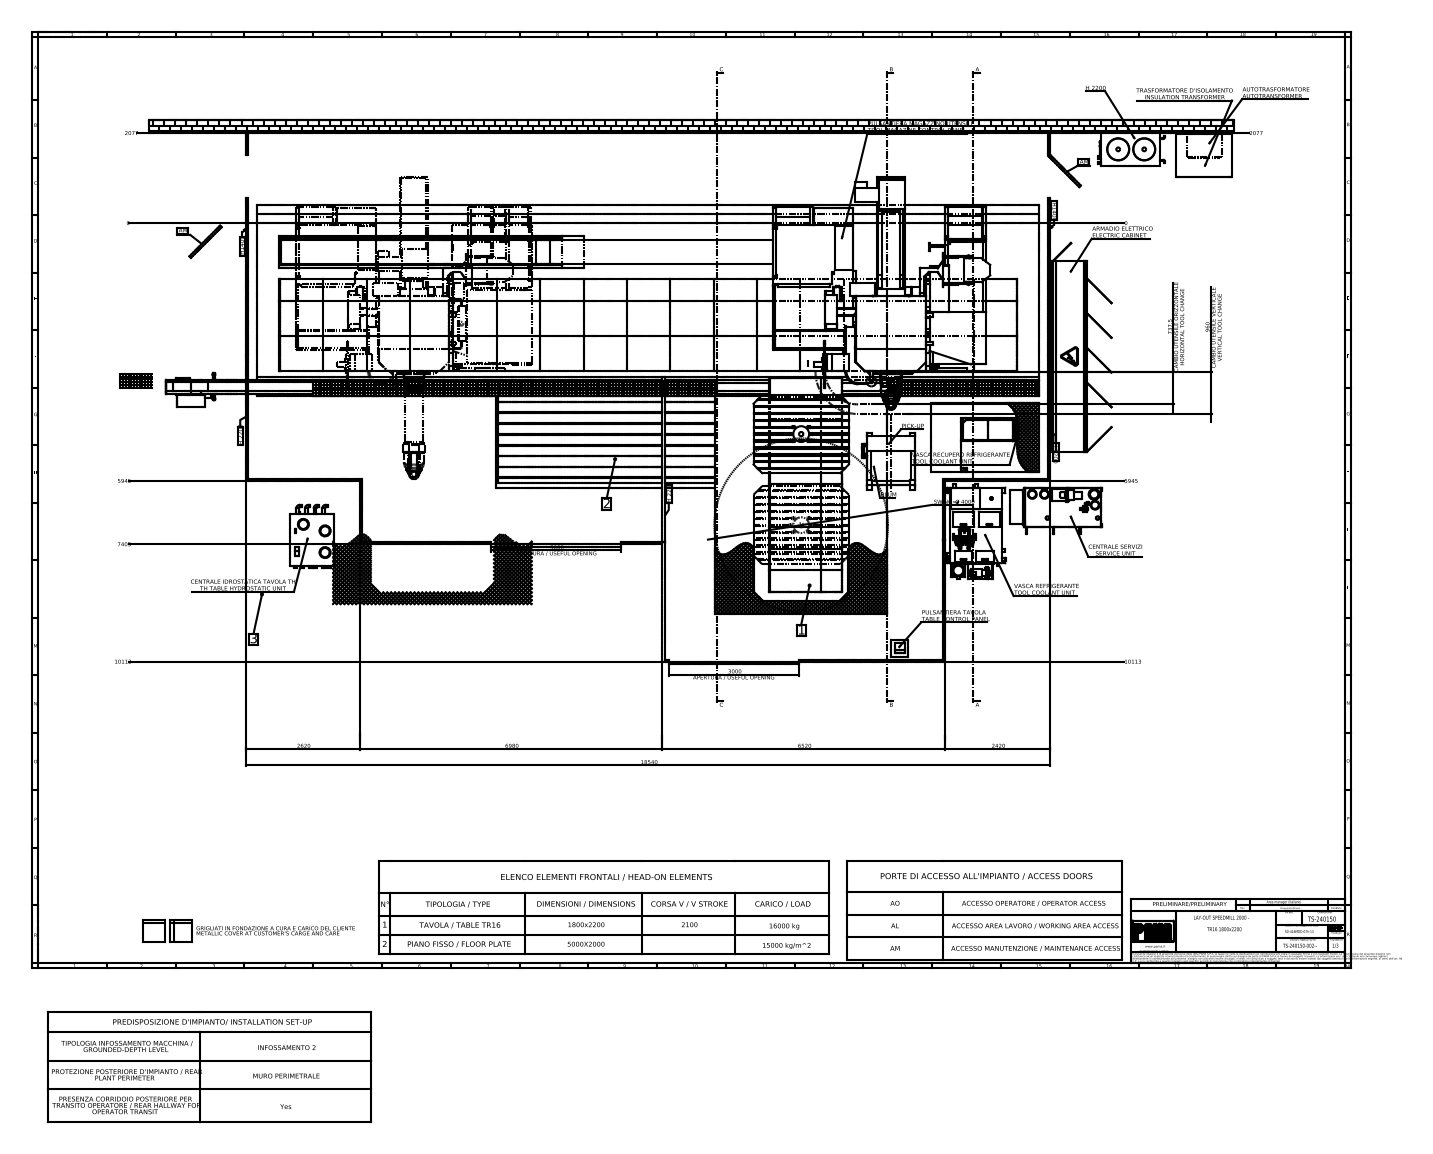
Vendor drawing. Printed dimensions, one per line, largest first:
18540
10113
10113
7405
6980
6520
5945
5945
SWING= Ø 4000
3000 APERTURA / USEFUL OPENING
3000 APERTURA / USEFUL OPENING
2620
2420
2077
2077
960 CAMBIO UTENSILE VERTICALE VERTICAL TOOL CHANGE
737,5 CAMBIO UTENSILE ORIZZONTALE HORIZONTAL TOOL CHANGE
0
0
